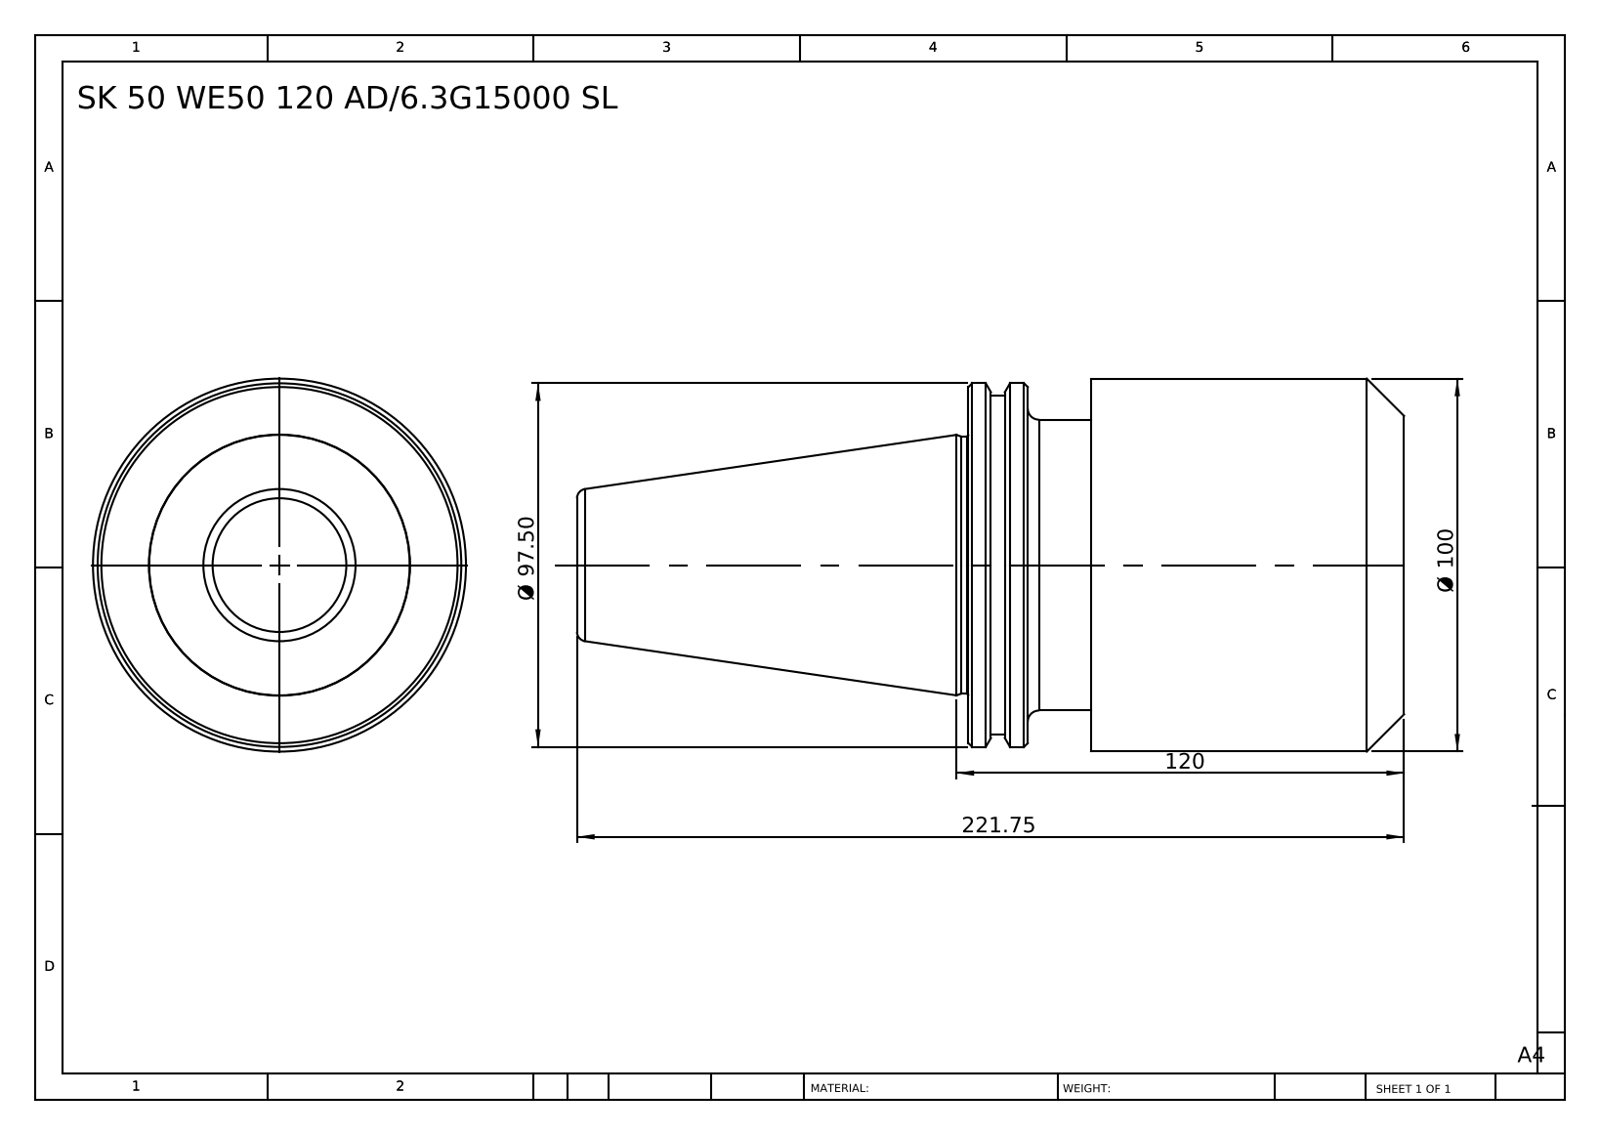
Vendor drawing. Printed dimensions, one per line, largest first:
221.75
120
Ø 100
Ø 97.50
